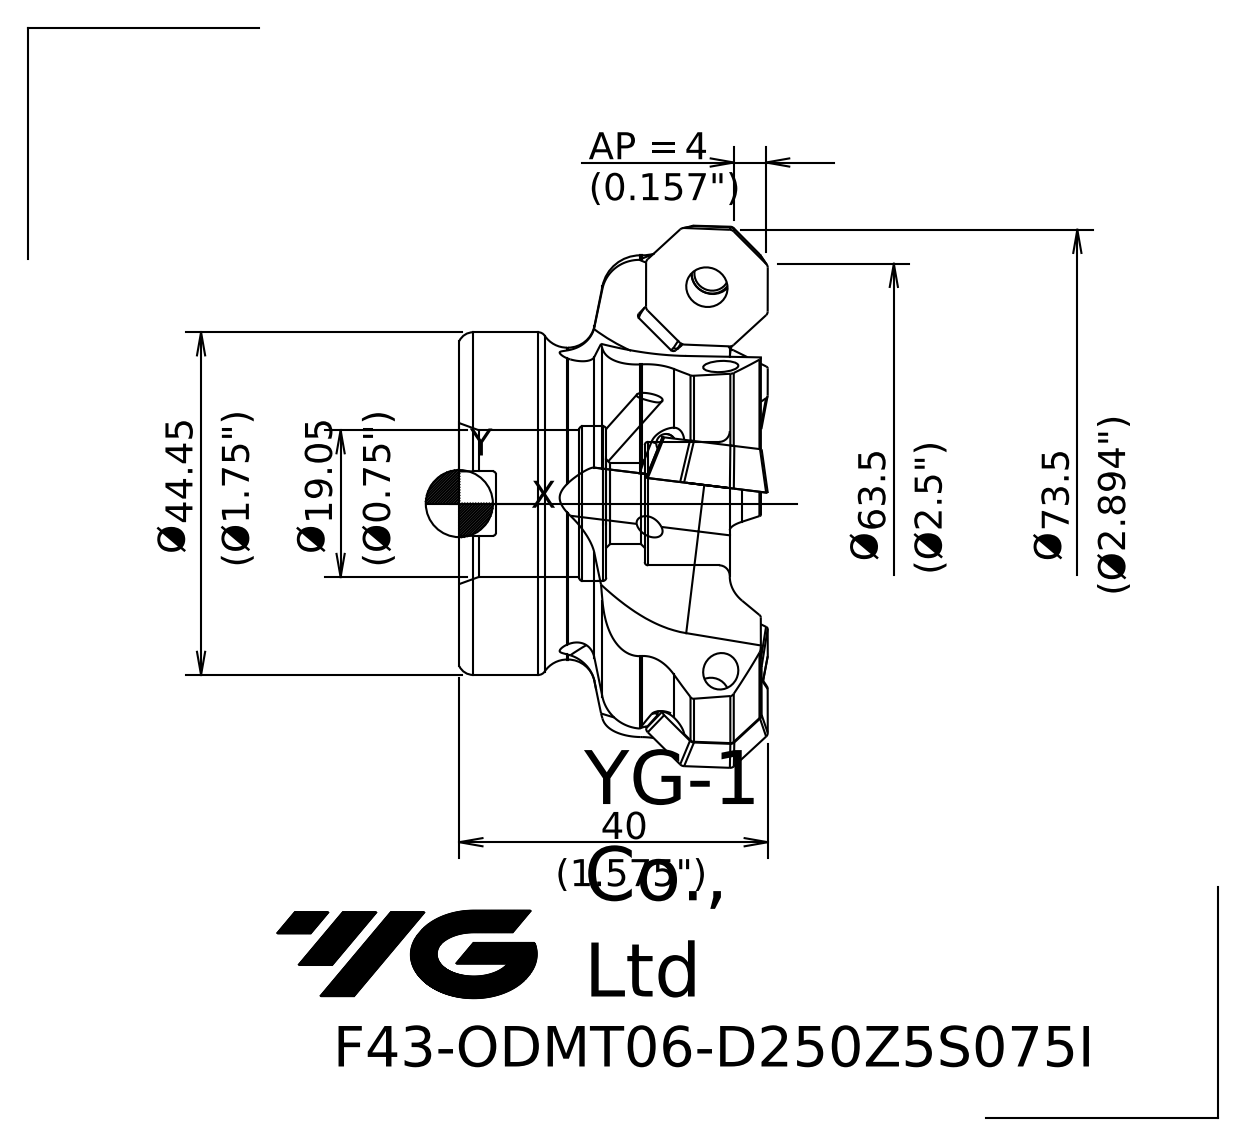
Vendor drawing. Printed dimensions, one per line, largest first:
73.5 Ø
63.5 Ø
44.45 Ø
40
19.05 Ø
AP = 4
